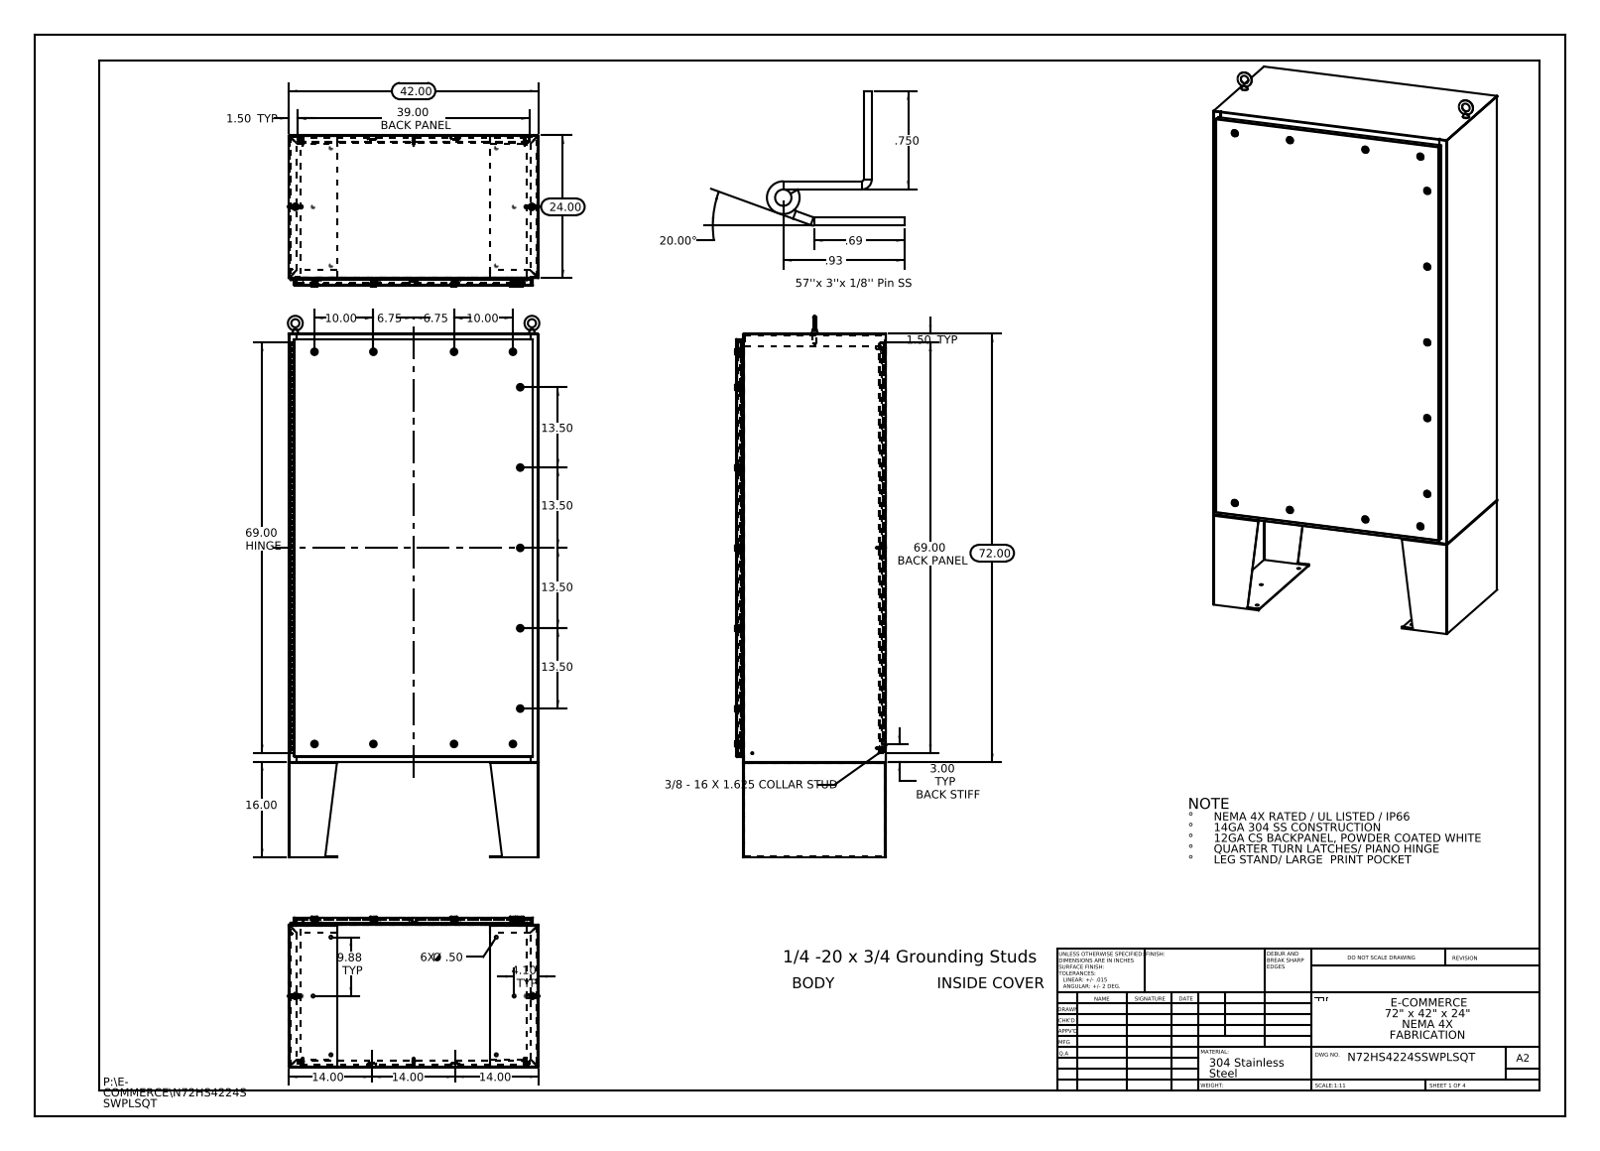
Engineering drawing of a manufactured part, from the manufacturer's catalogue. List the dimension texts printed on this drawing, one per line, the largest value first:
72.00
69.00 HINGE
69.00 BACK PANEL
42.00
39.00 BACK PANEL
24.00
20.00°
16.00
14.00
14.00
14.00
13.50
13.50
13.50
13.50
10.00
10.00
9.88 TYP
6.75
6.75
4.10 TYP
3.00 TYP BACK STIFF
1.50 TYP
1.50 TYP
.93
.750
.69
6X Ø .50
